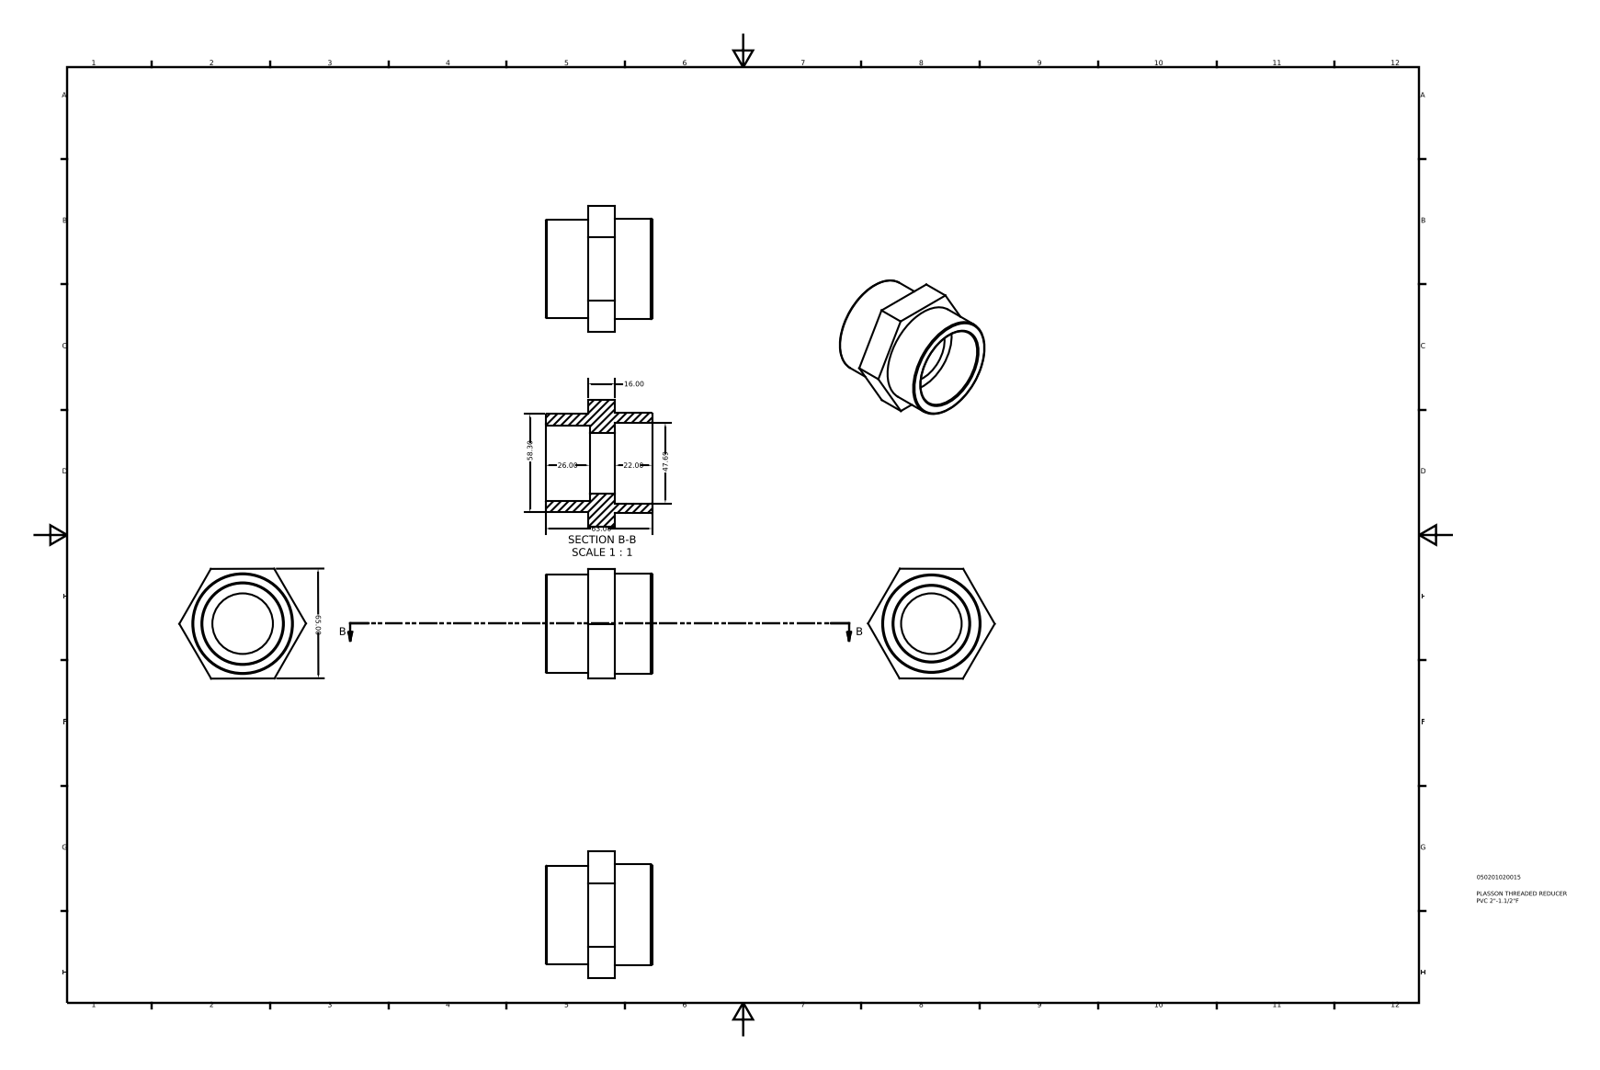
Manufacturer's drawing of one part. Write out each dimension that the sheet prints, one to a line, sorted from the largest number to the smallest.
65.00
63.00
58.30
47.69
26.00
22.00
16.00
